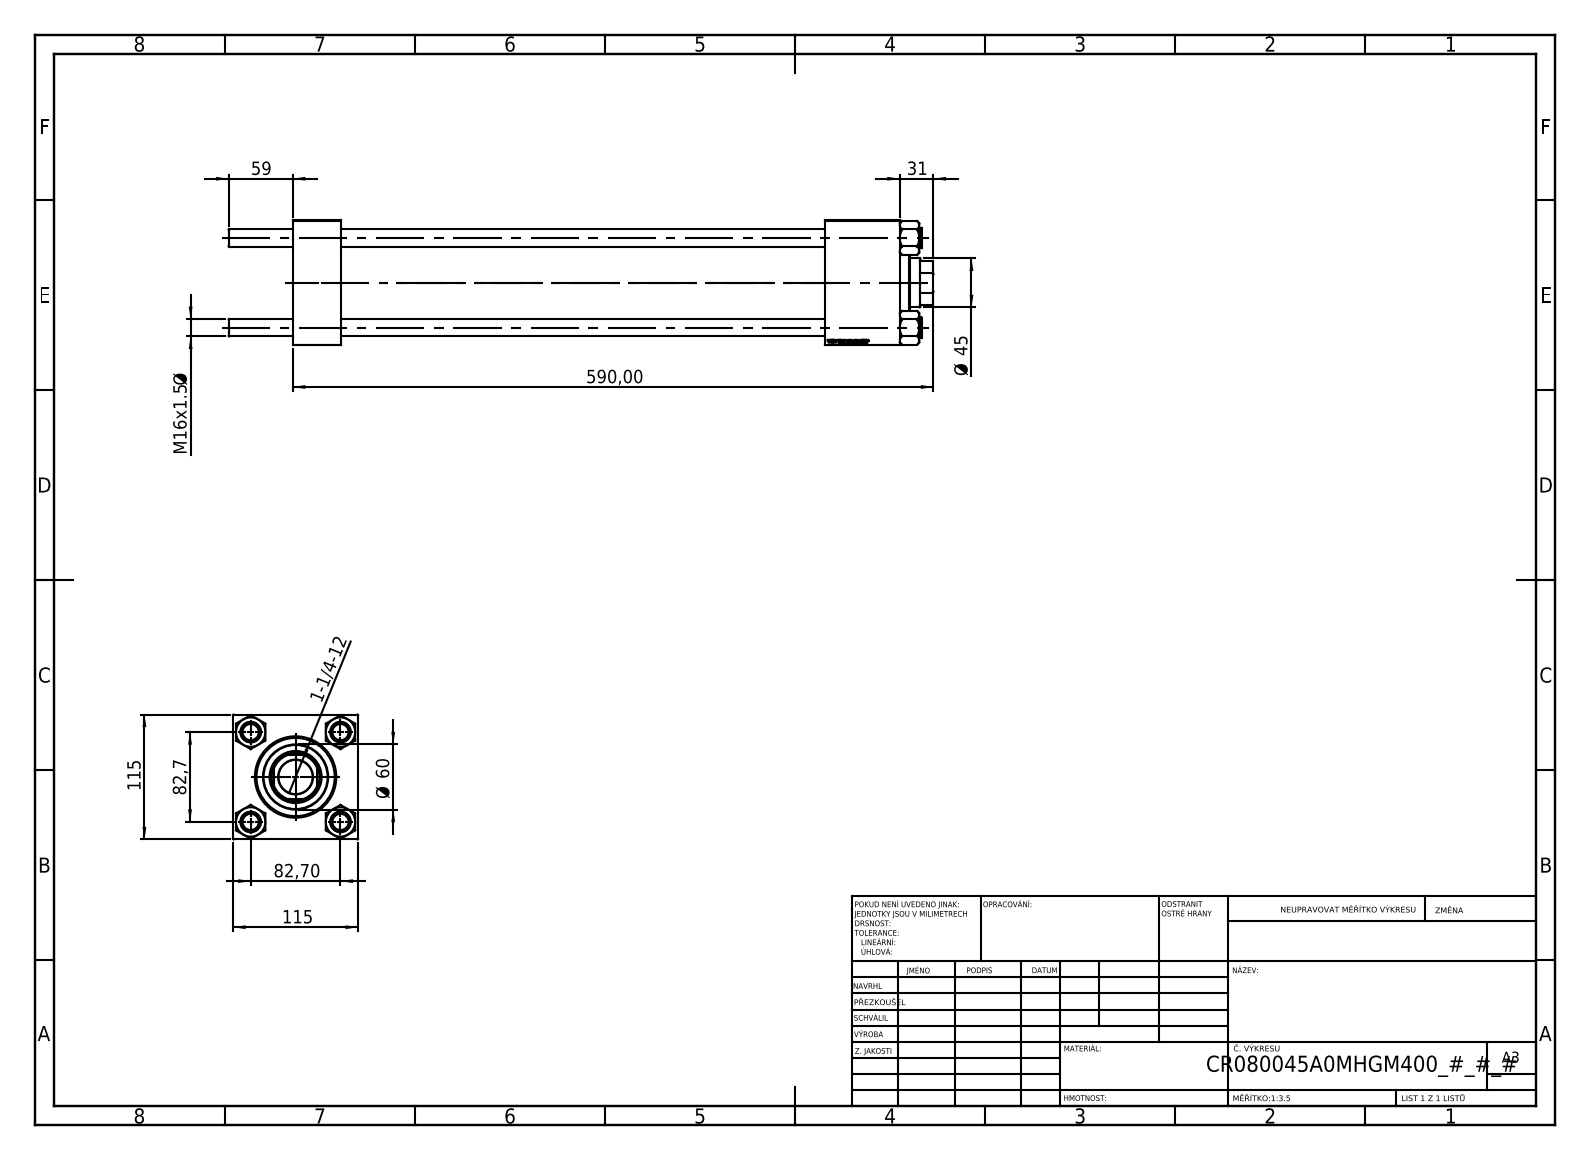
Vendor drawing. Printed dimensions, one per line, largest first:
590,00
115
115
82,7
82,70
Ø 60
59
Ø 45
31
M16x1.5 Ø
1-1/4-12
